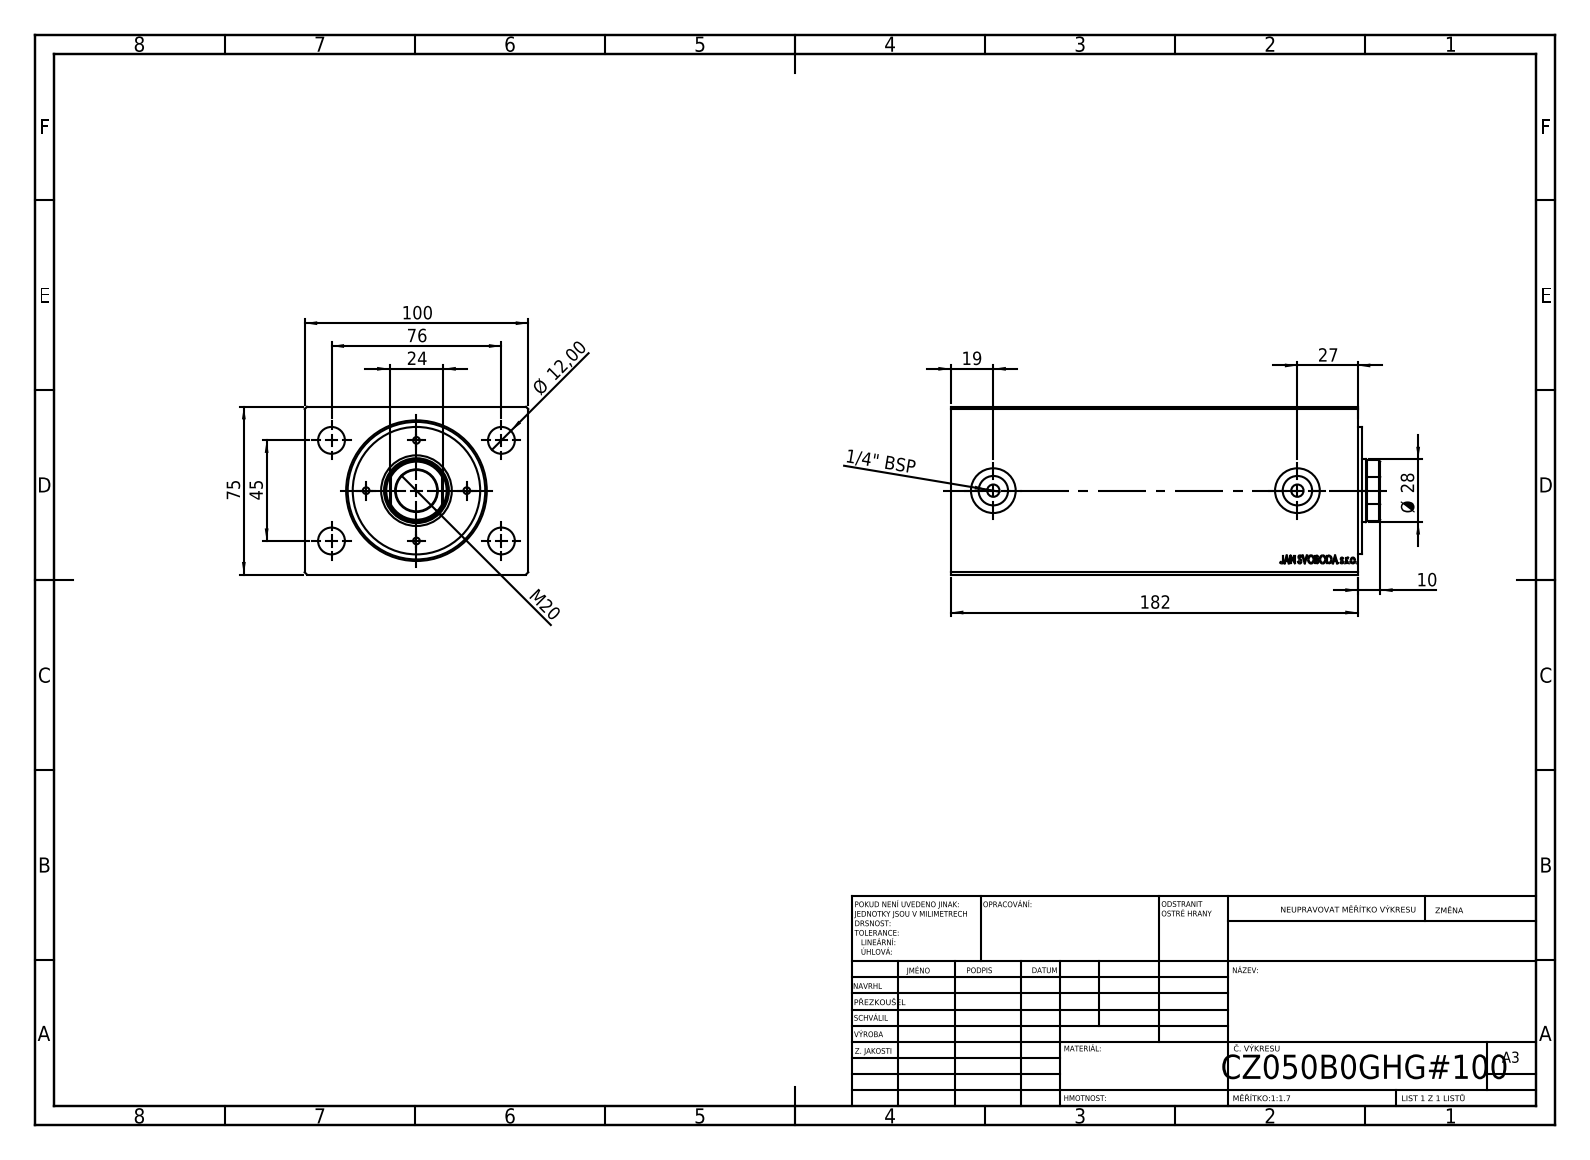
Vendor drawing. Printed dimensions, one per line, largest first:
182
100
76
75
45
Ø 28
27
24
M20
19
Ø 12,00
10
1/4" BSP
